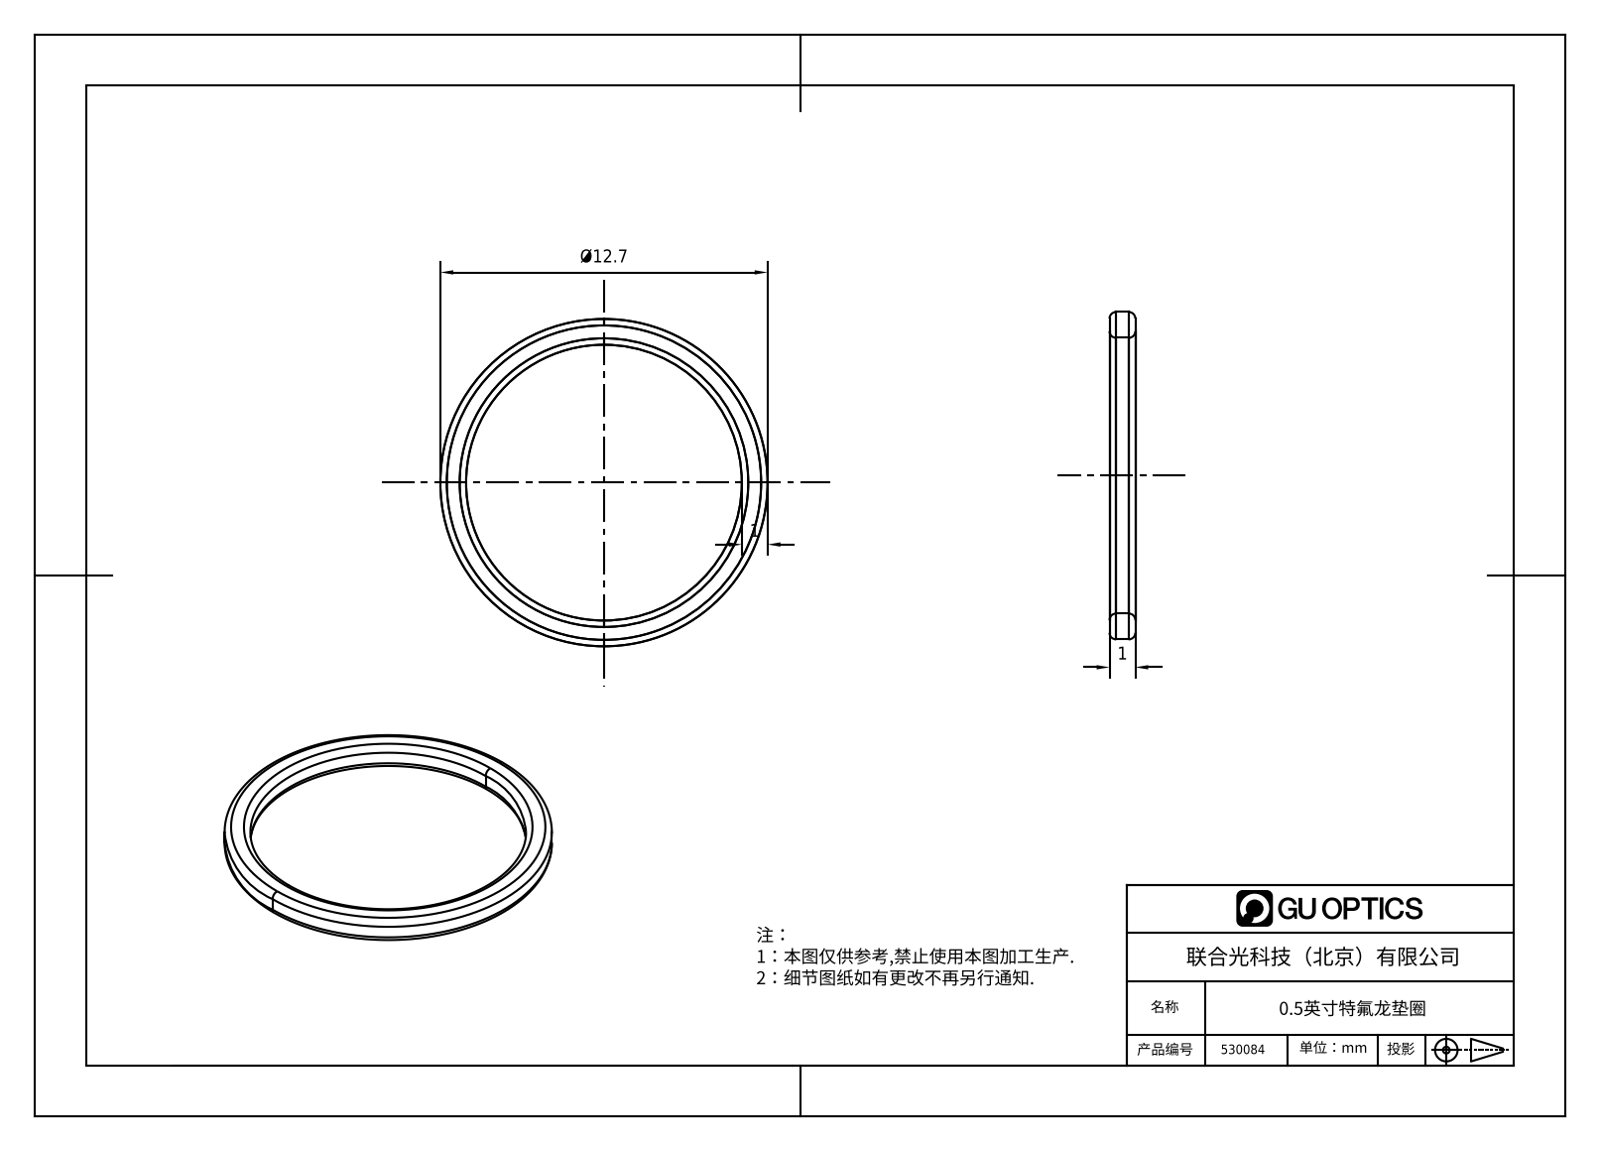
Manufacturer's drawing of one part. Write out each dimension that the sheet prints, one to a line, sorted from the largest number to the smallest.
Ø12.7
1
1
